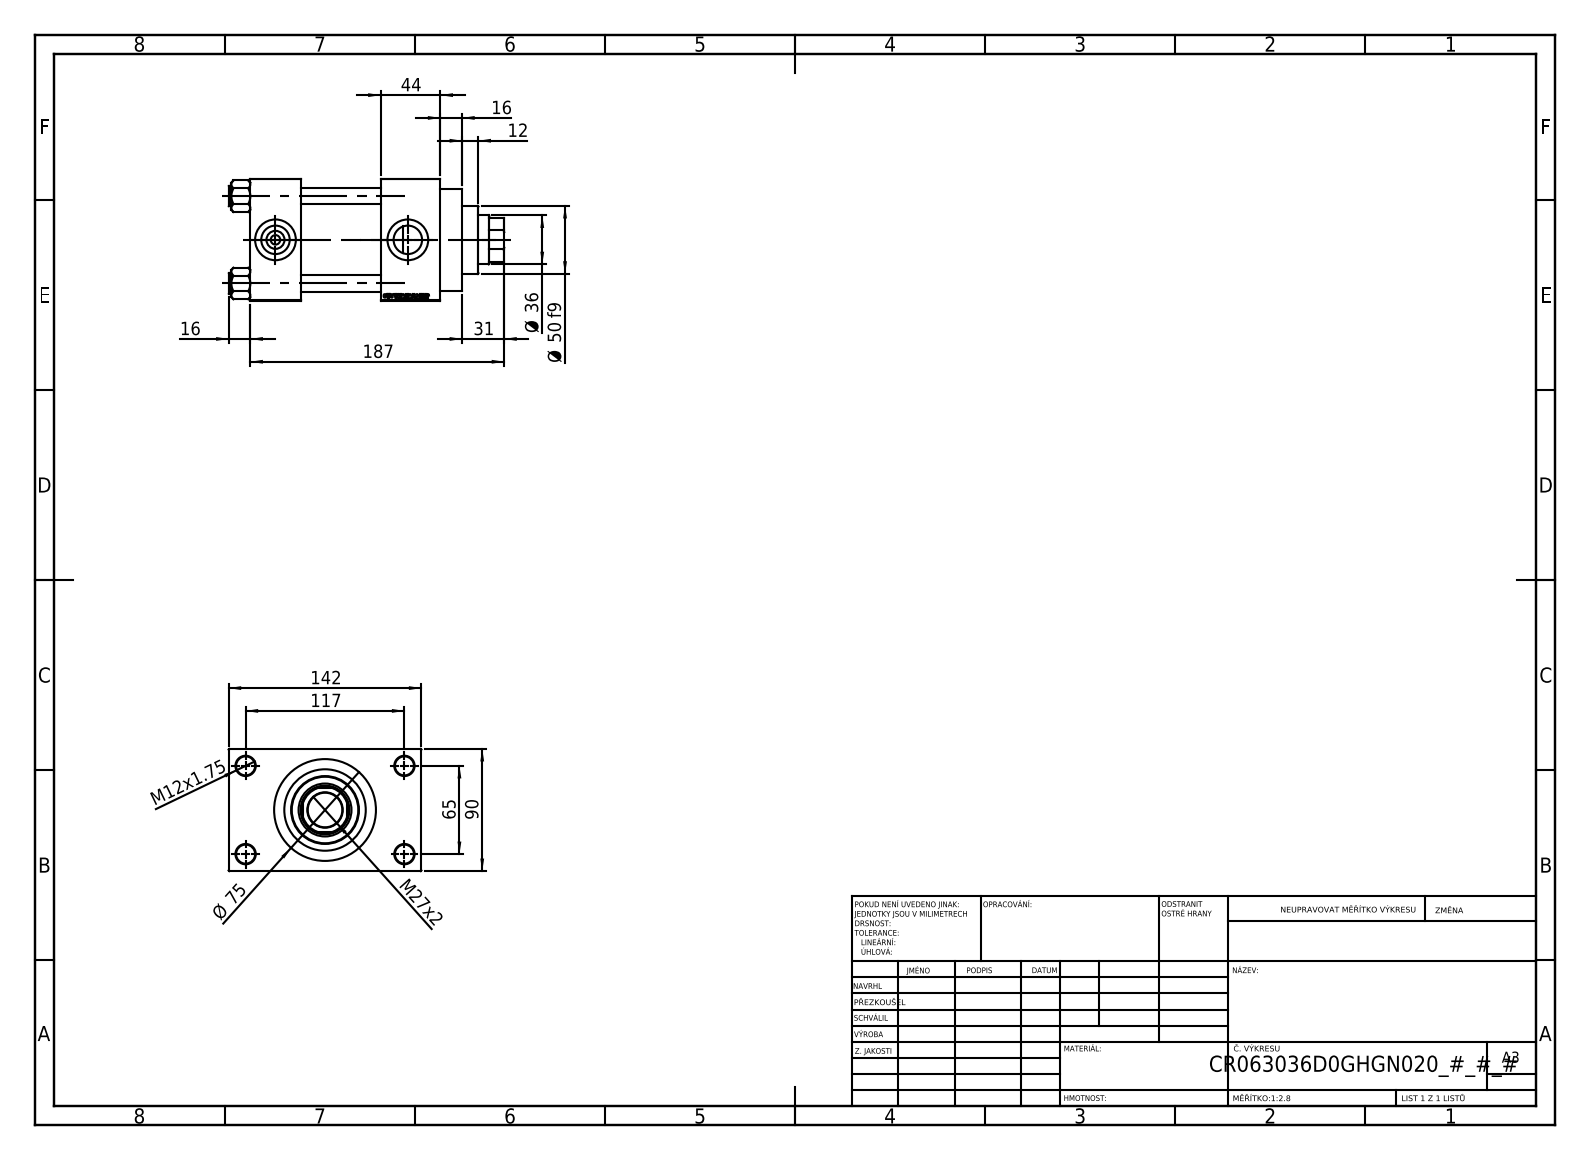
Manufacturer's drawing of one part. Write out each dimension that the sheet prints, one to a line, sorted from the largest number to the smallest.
187
142
117
90
Ø 75
65
Ø 50 f9
44
Ø 36
31
M27x2
16
16
12
M12x1.75
